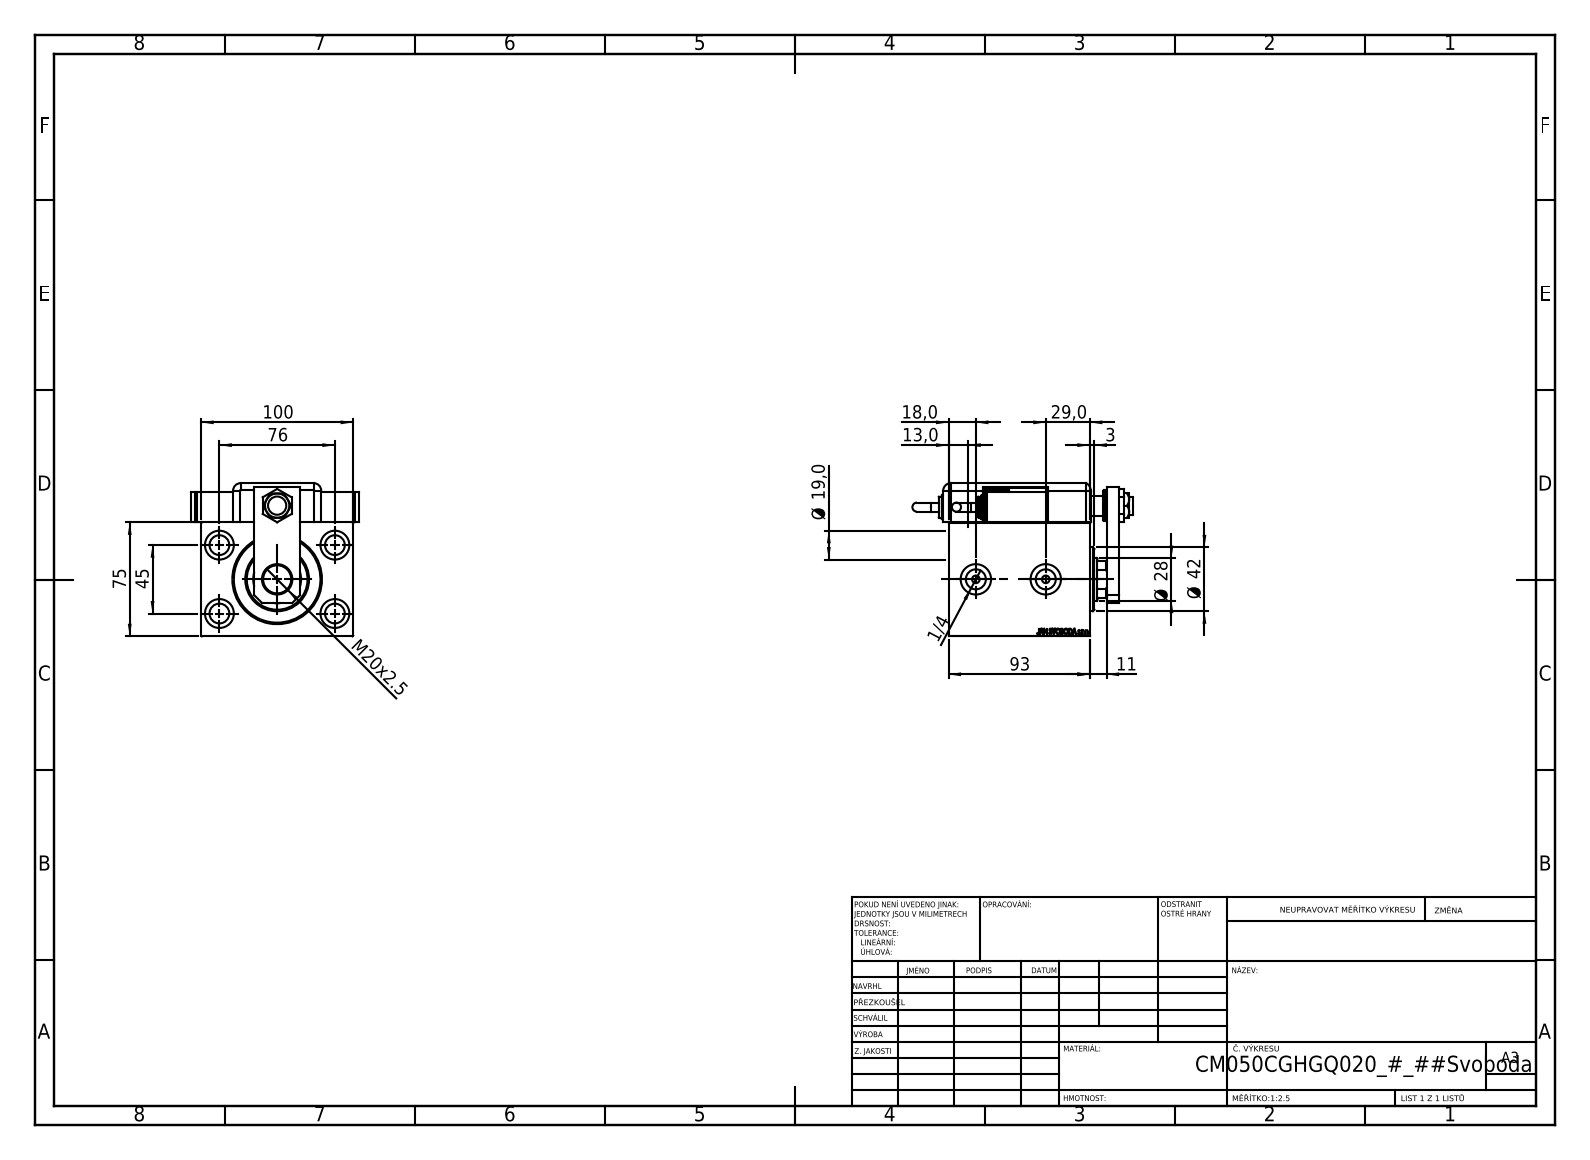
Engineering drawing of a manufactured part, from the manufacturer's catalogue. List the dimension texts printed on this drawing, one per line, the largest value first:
100
93
76
75
45
Ø 42
29,0
Ø 28
M20x2.5
Ø 19,0
18,0
13,0
11
3
1/4
